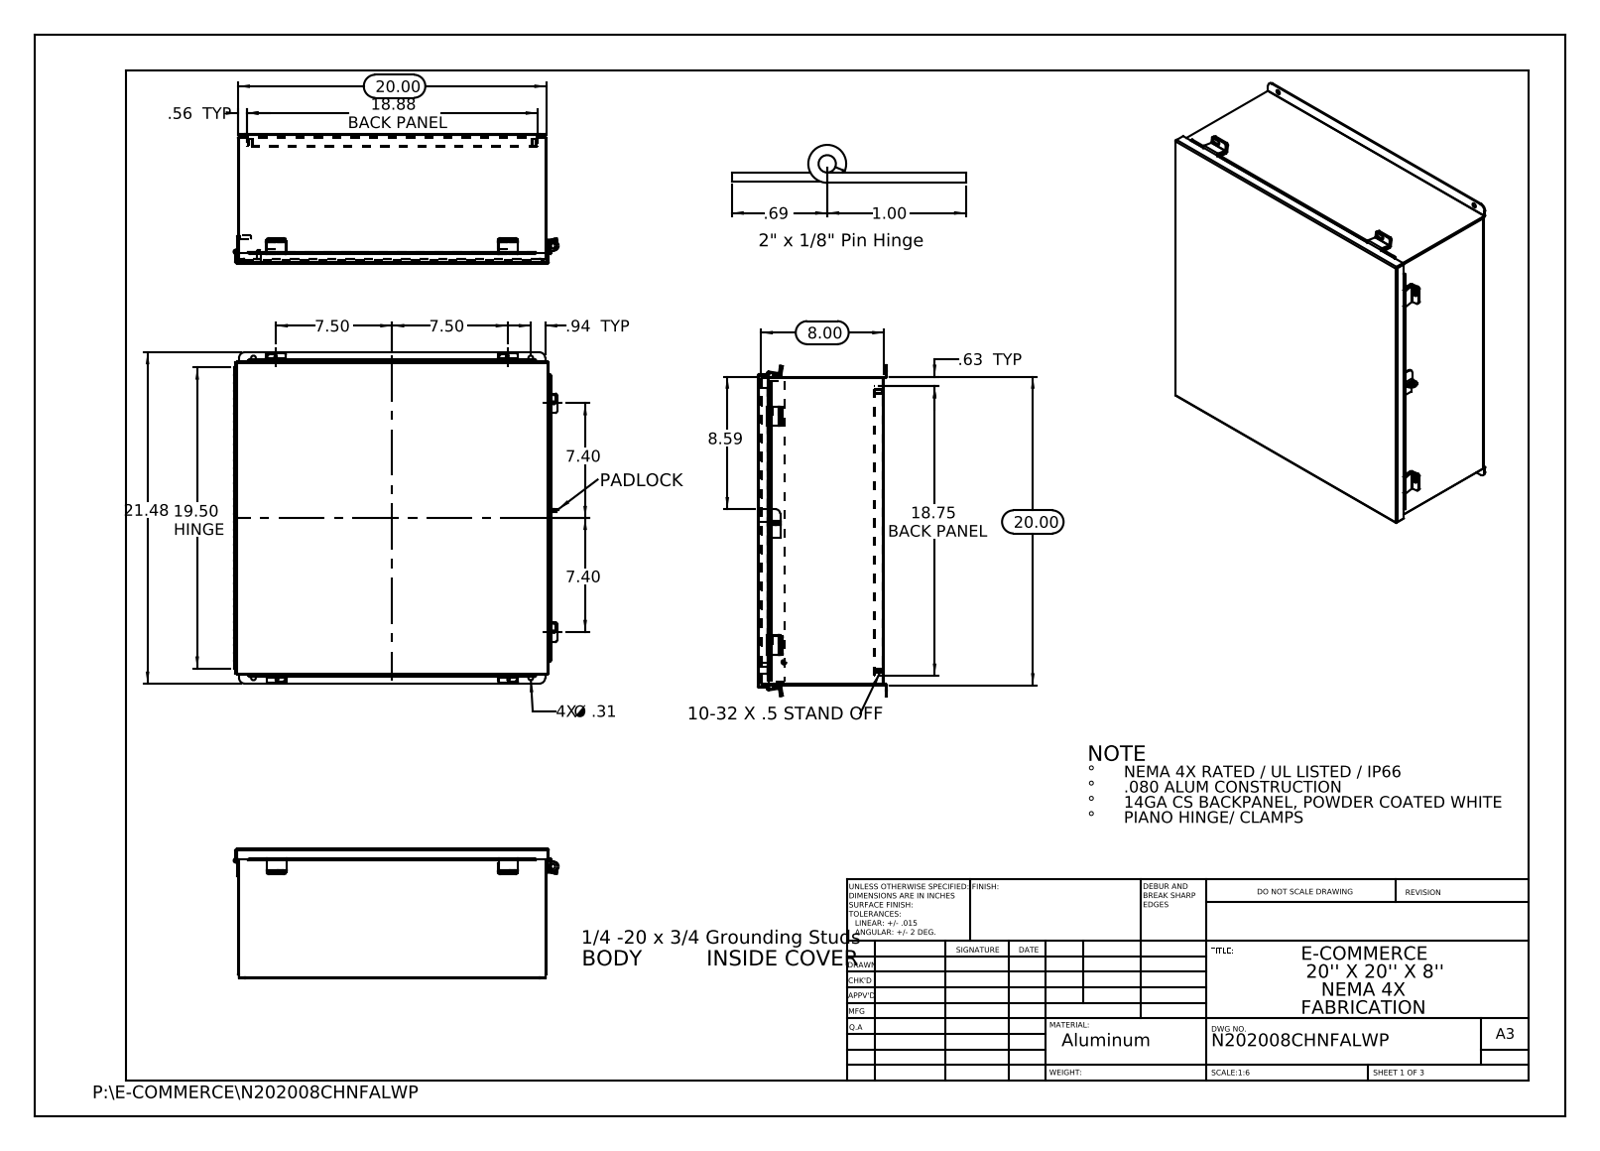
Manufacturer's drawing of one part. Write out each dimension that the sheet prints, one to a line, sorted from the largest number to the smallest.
21.48
20.00
20.00
19.50 HINGE
18.88 BACK PANEL
18.75 BACK PANEL
8.59
8.00
7.50
7.50
7.40
7.40
1.00
.94 TYP
.69
.63 TYP
.56 TYP
4X Ø .31
